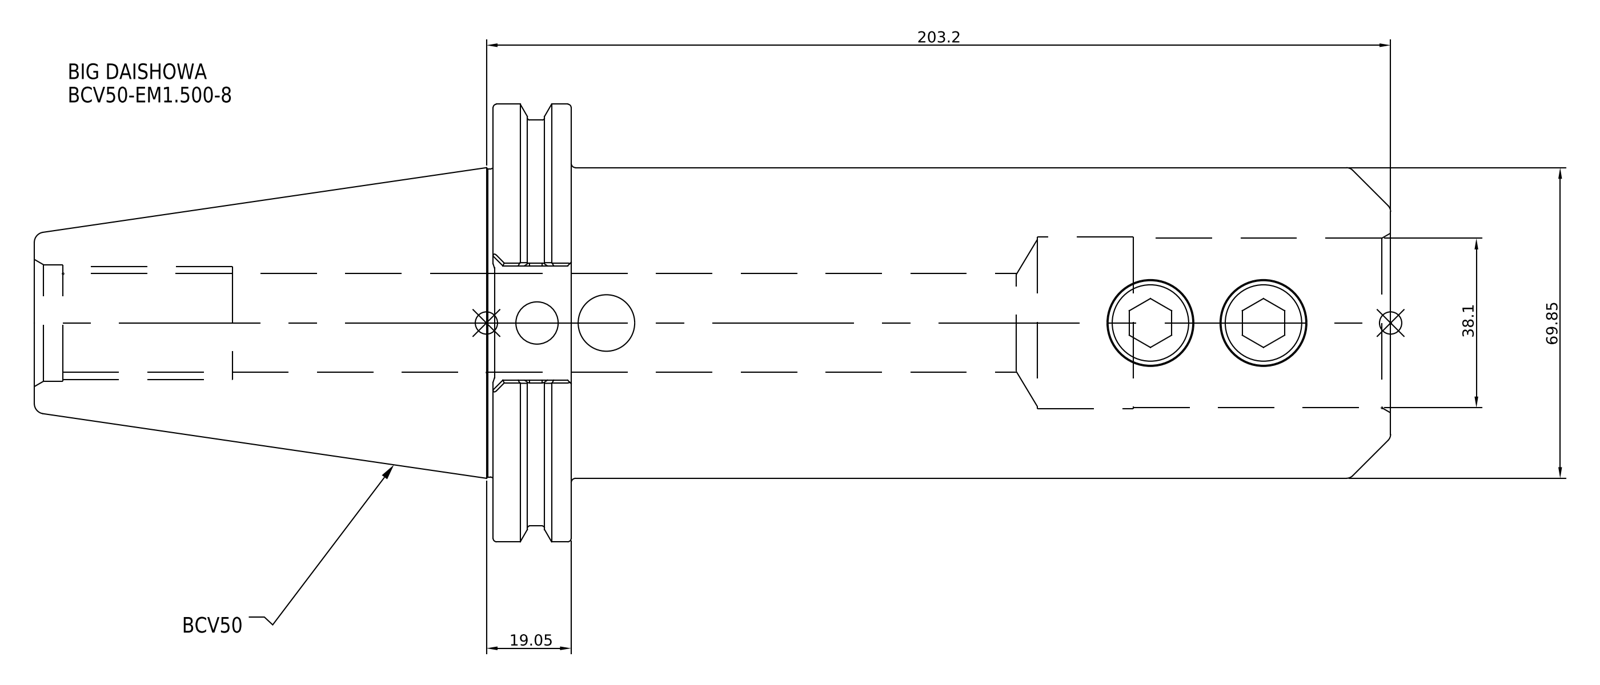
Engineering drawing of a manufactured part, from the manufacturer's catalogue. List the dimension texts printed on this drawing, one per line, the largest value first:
203.2
69.85
38.1
19.05
